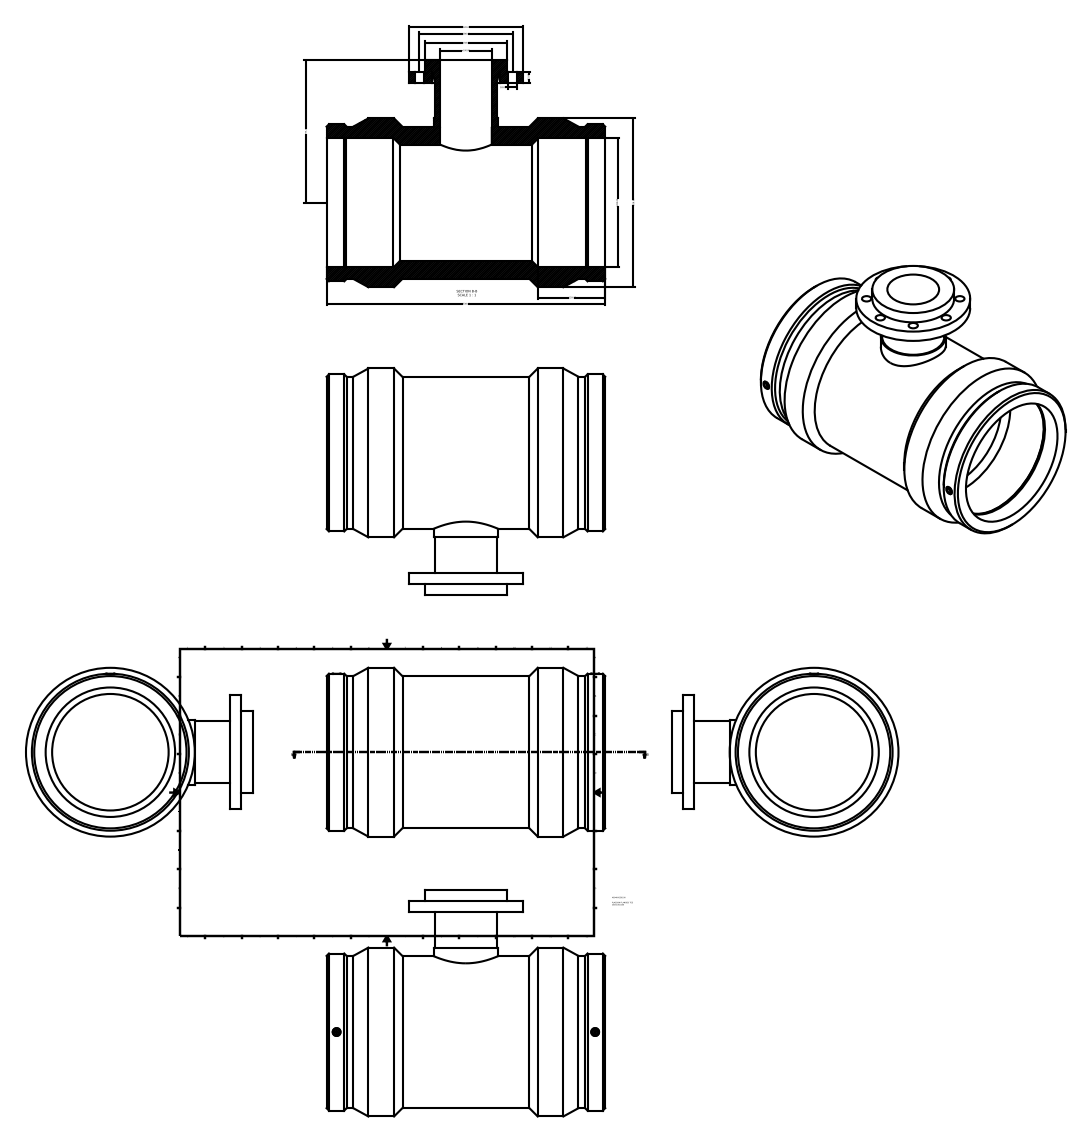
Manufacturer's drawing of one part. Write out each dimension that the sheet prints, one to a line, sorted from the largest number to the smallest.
538.00
326.00
275.00
n250.00
220.00
180.00
158.00
129.00
n100.00
22.00
18.00
